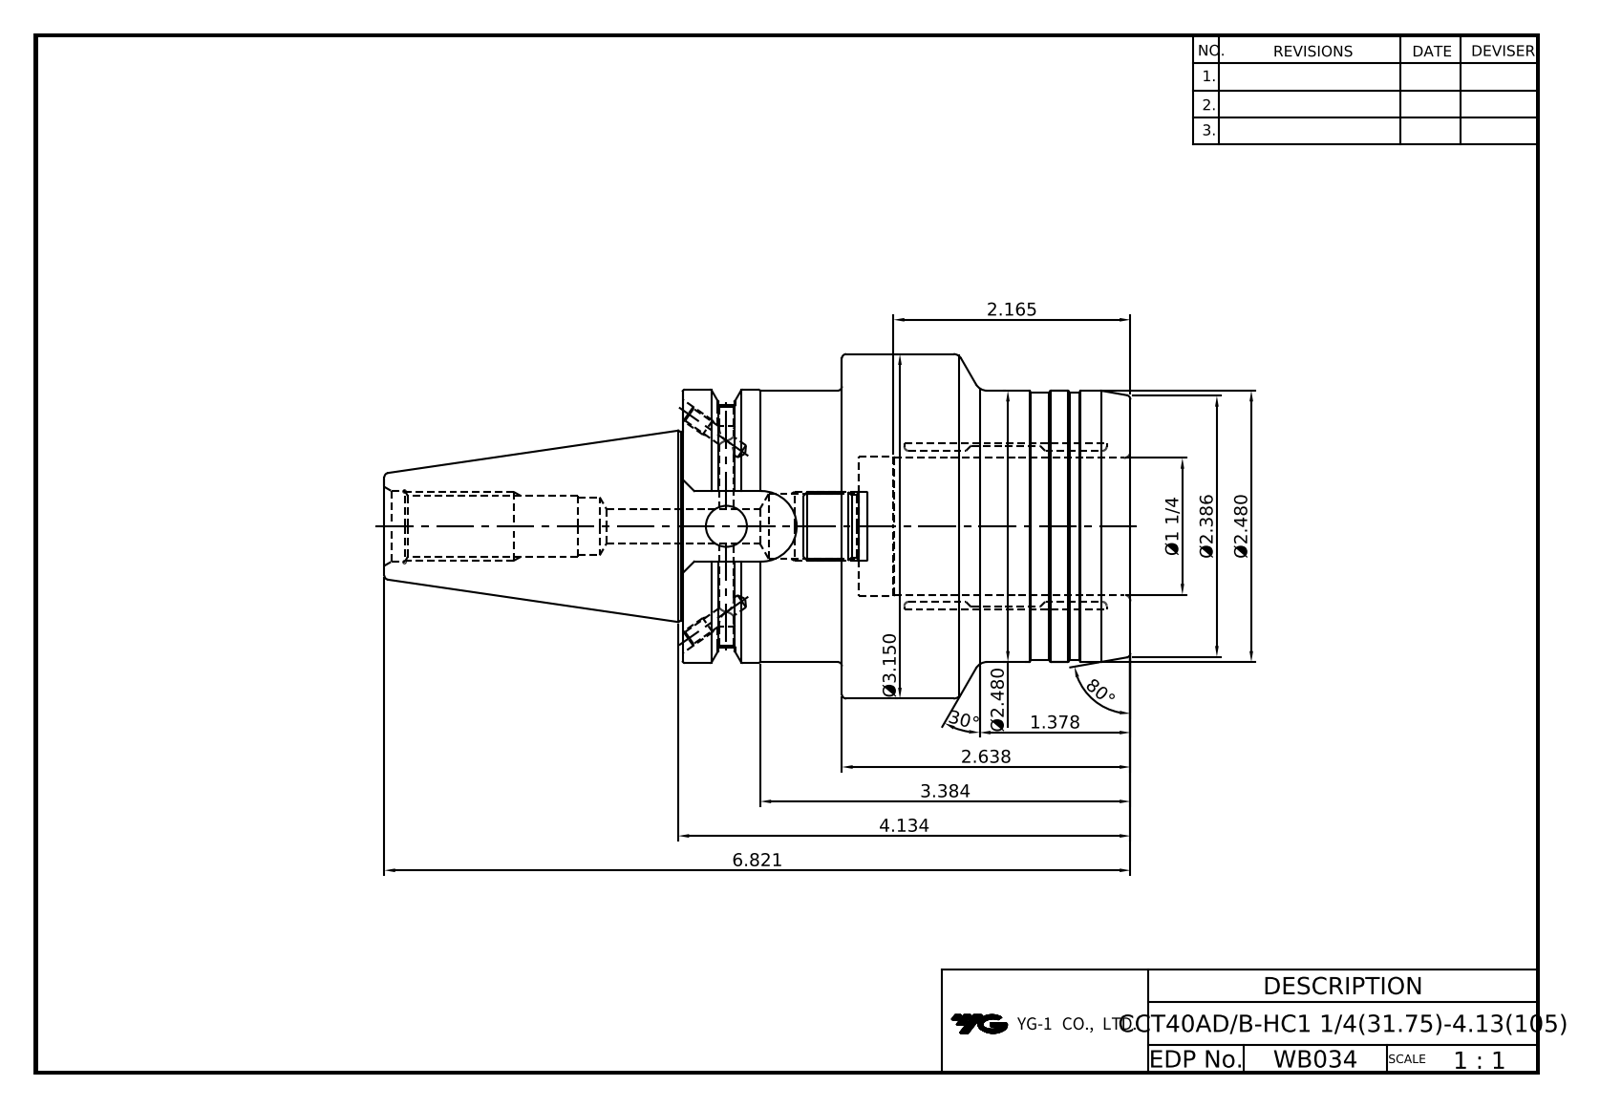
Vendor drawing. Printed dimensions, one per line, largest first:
80°
30°
6.821
4.134
3.384
Ø3.150
2.638
Ø2.480
Ø2.480
Ø2.386
2.165
1.378
Ø1 1/4
